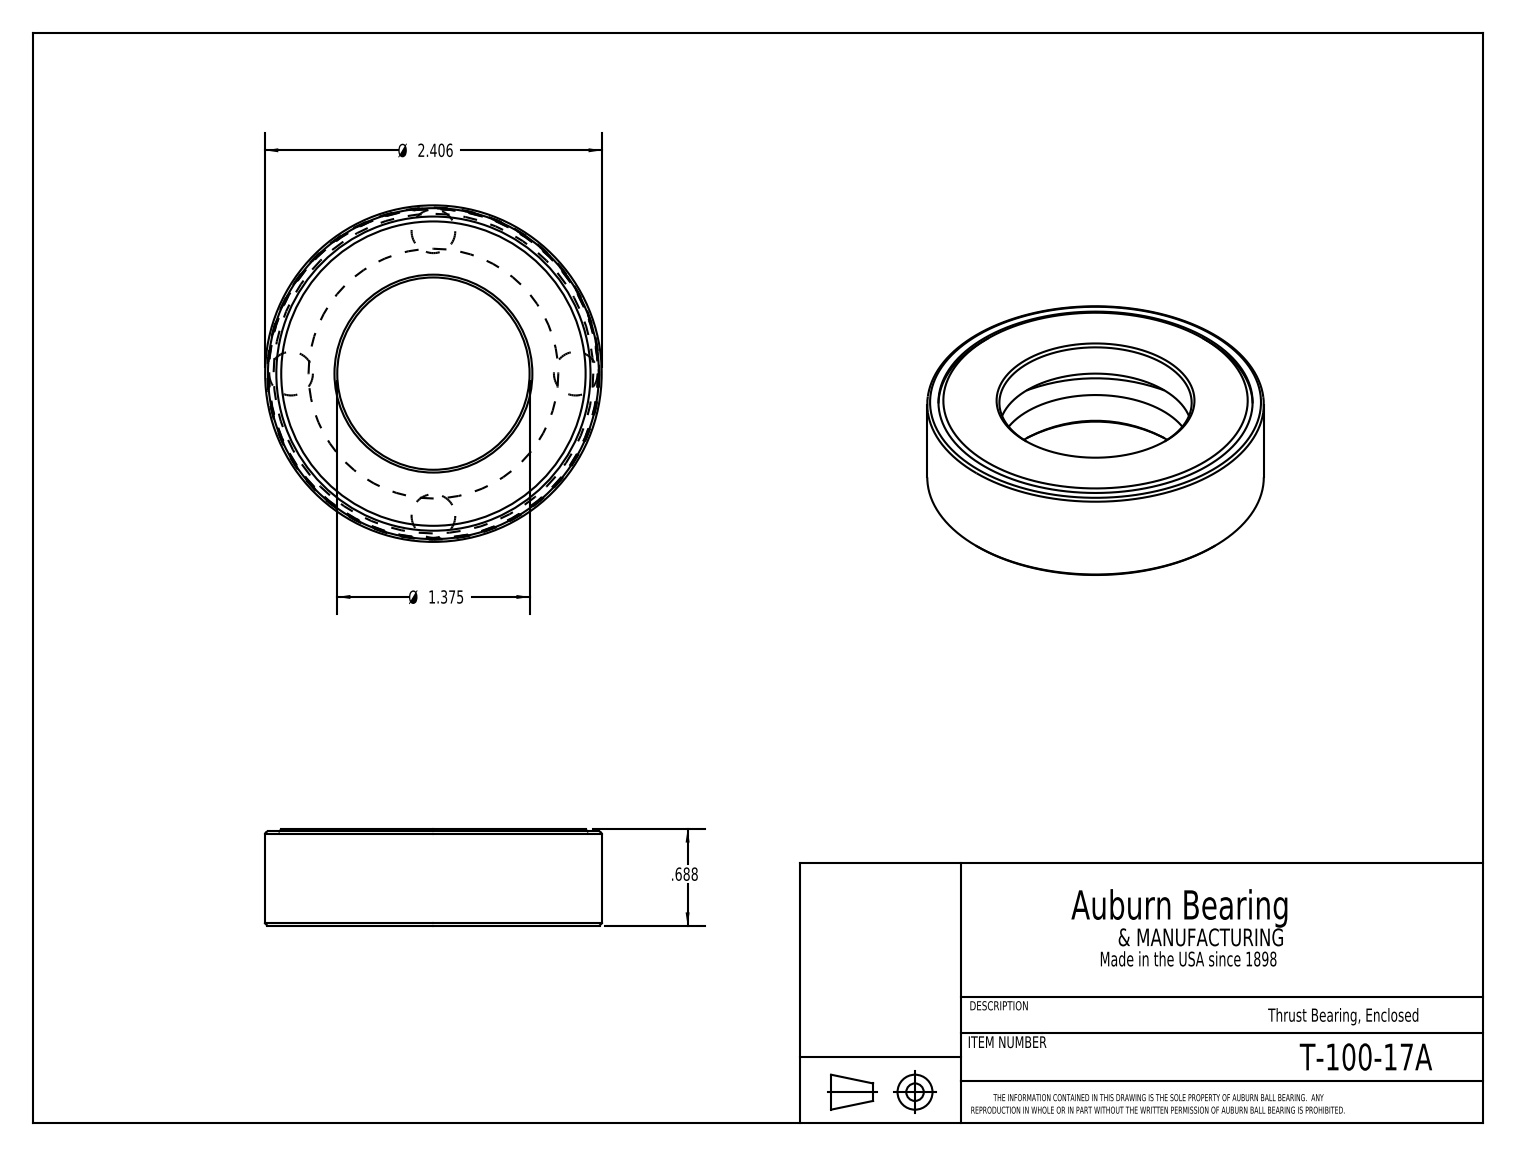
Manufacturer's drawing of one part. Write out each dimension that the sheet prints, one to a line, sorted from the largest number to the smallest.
Ø 2.406
Ø 1.375
.688
